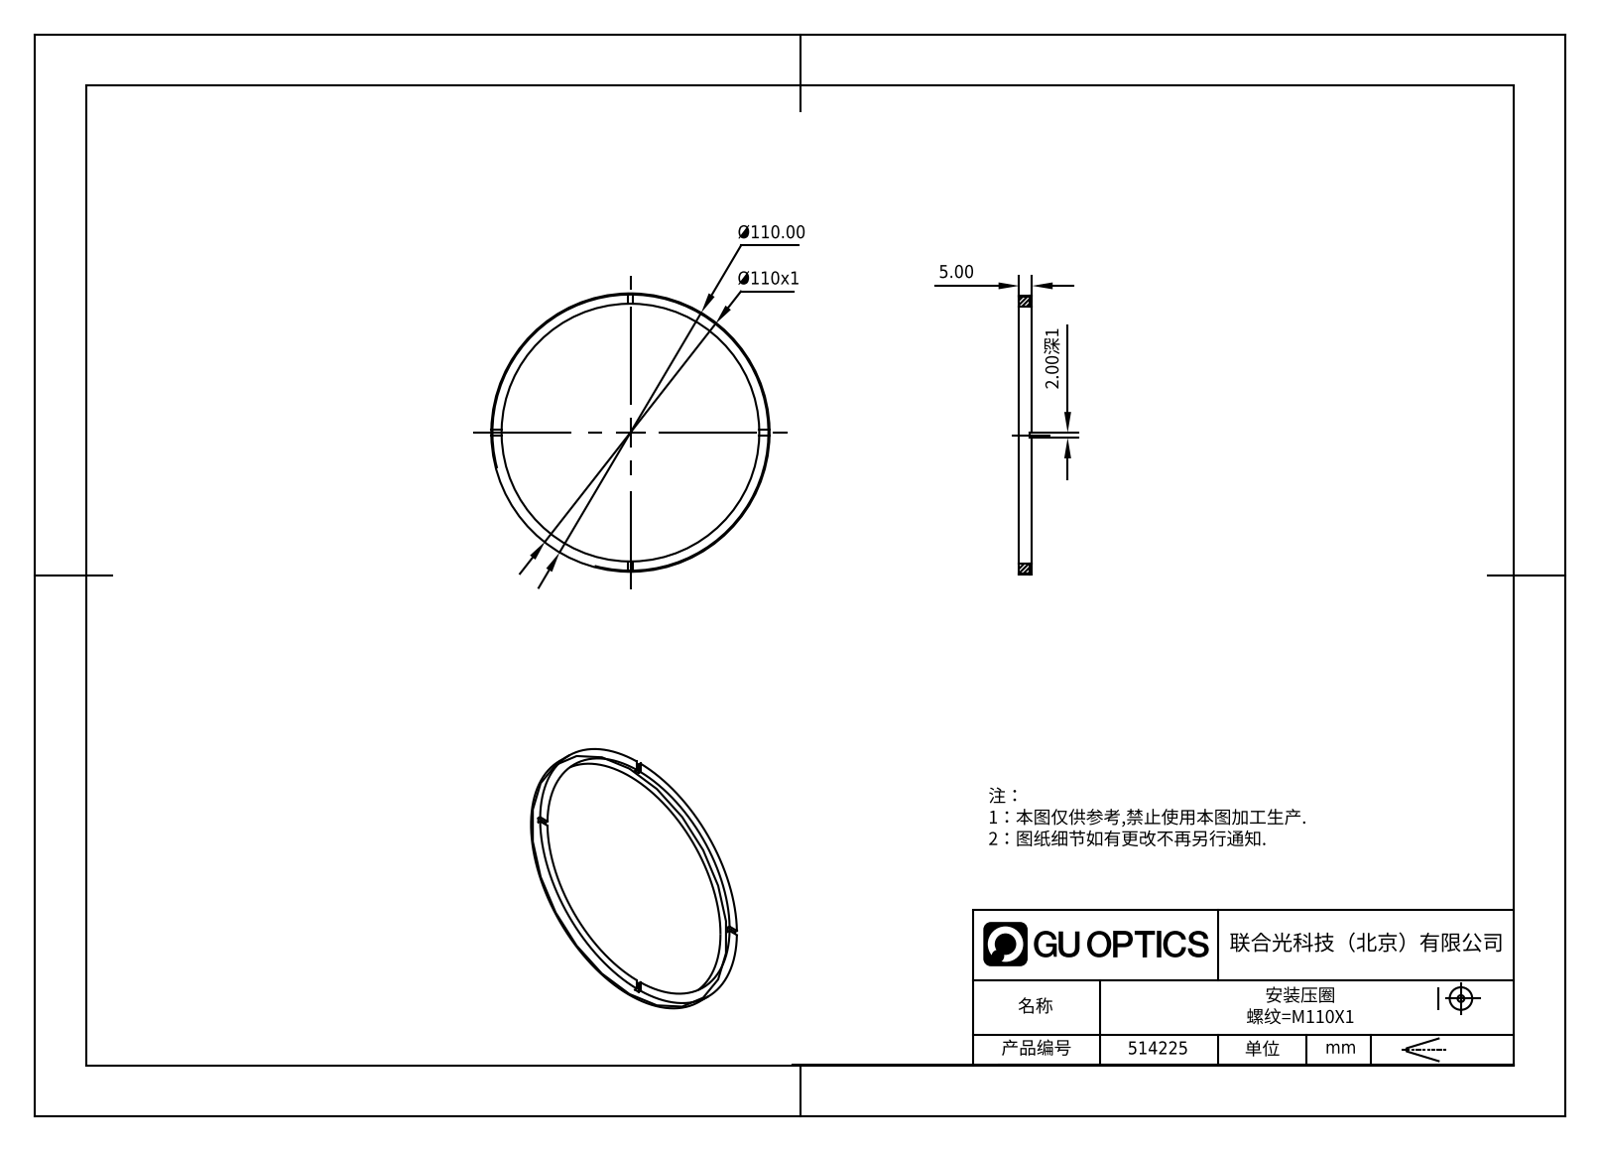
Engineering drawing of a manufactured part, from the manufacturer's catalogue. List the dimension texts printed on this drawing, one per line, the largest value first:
Ø110.00
Ø110x1
5.00
2.00深1
